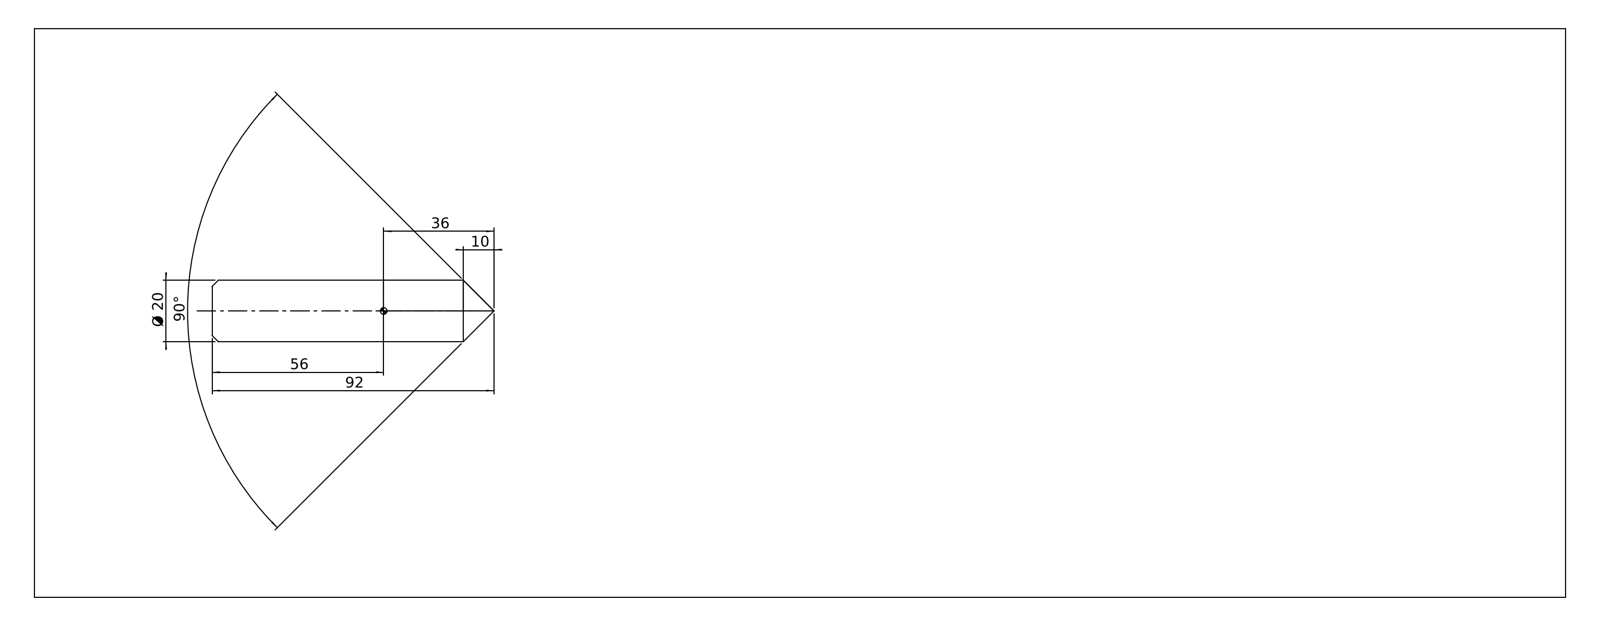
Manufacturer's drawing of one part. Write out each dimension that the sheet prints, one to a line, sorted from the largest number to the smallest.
92
90°
56
36
Ø 20
10
